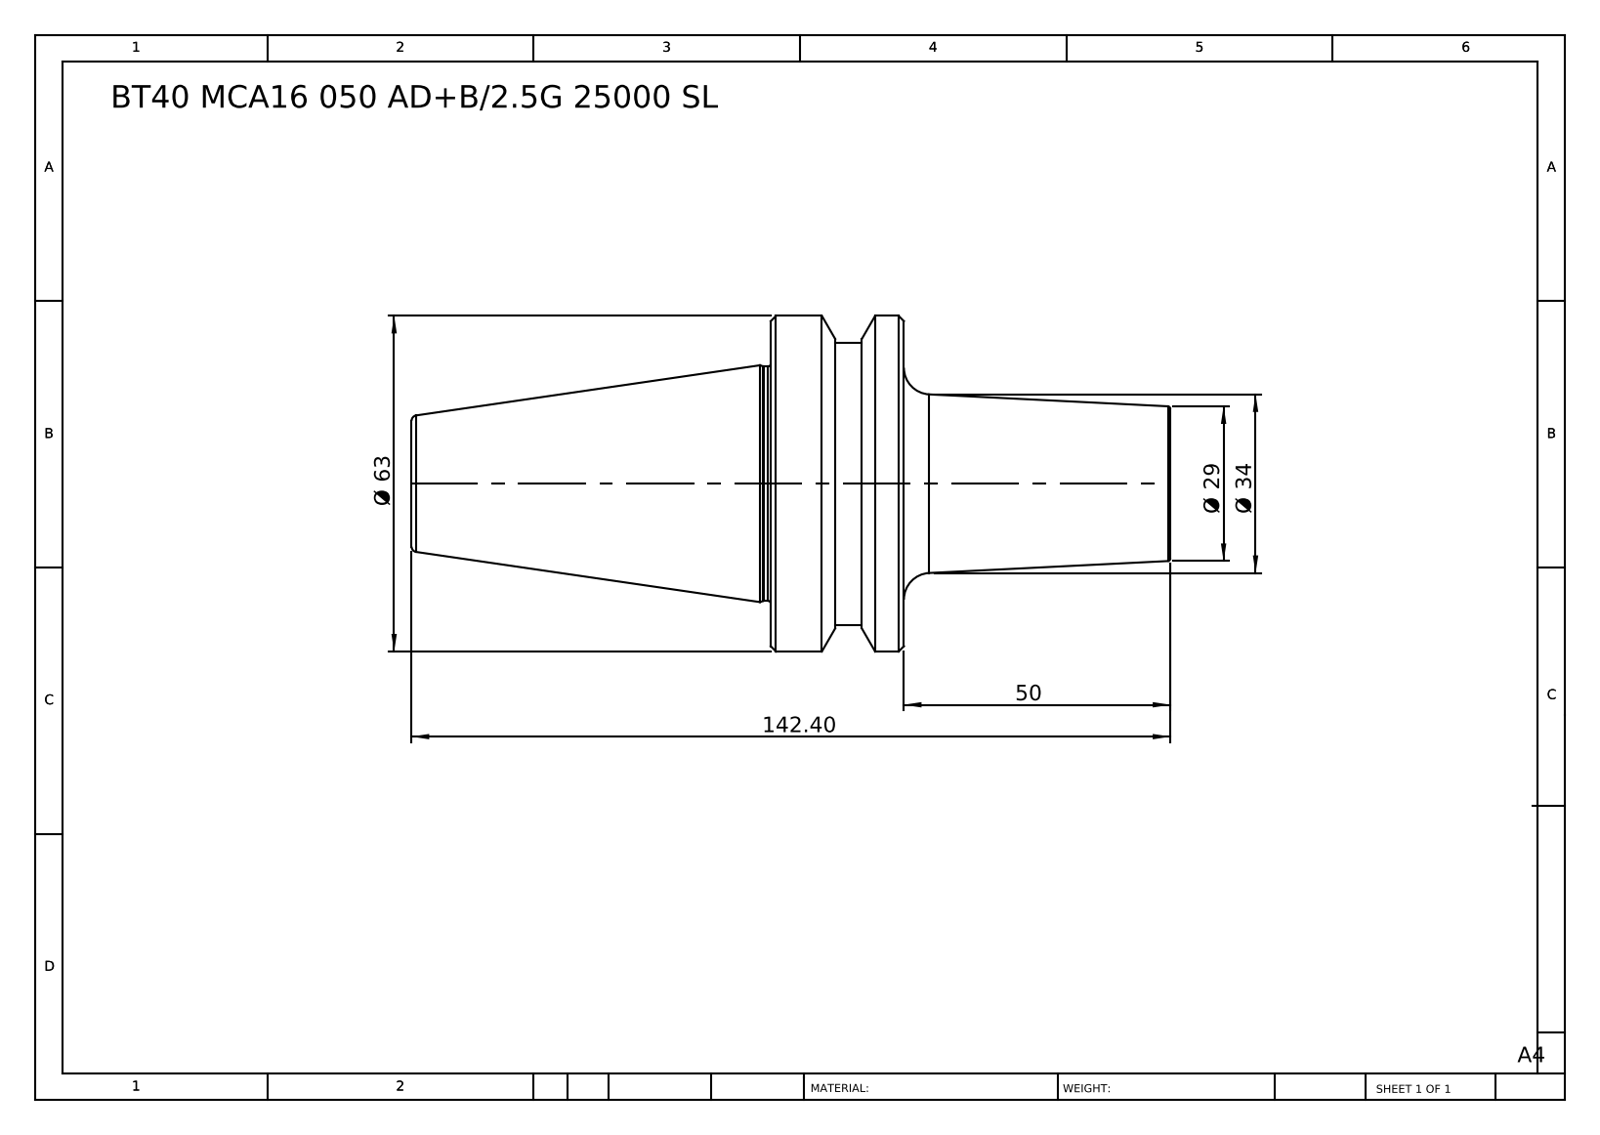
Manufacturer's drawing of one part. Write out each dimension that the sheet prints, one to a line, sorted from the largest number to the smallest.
142.40
Ø 63
50
Ø 34
Ø 29
